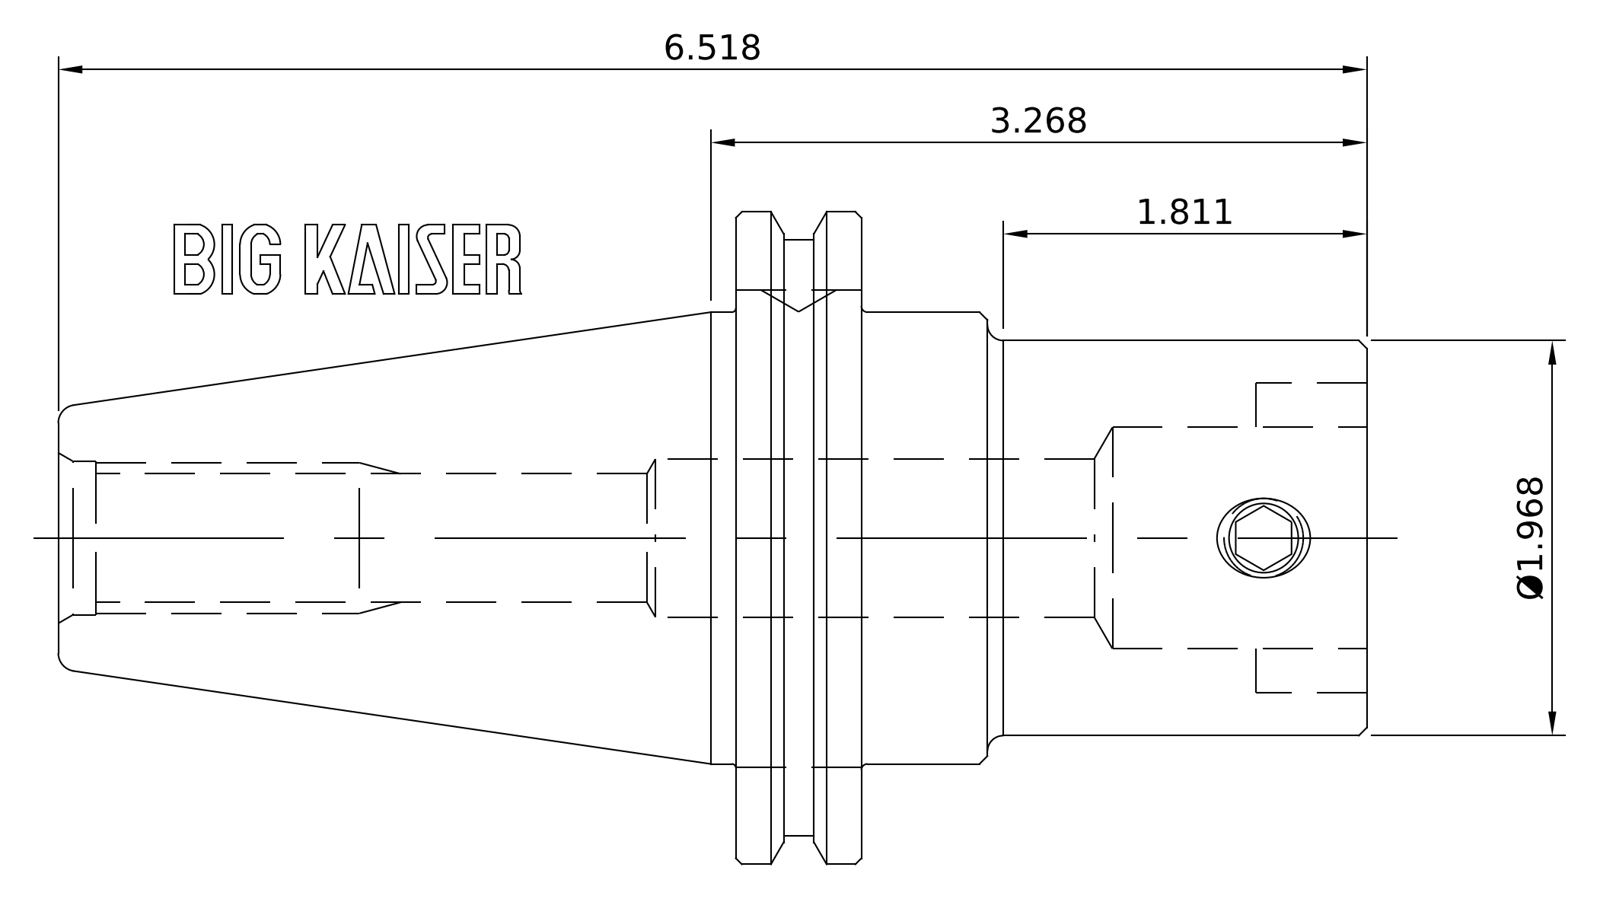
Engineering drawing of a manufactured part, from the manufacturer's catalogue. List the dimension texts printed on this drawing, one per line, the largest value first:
6.518
3.268
Ø1.968
1.811
